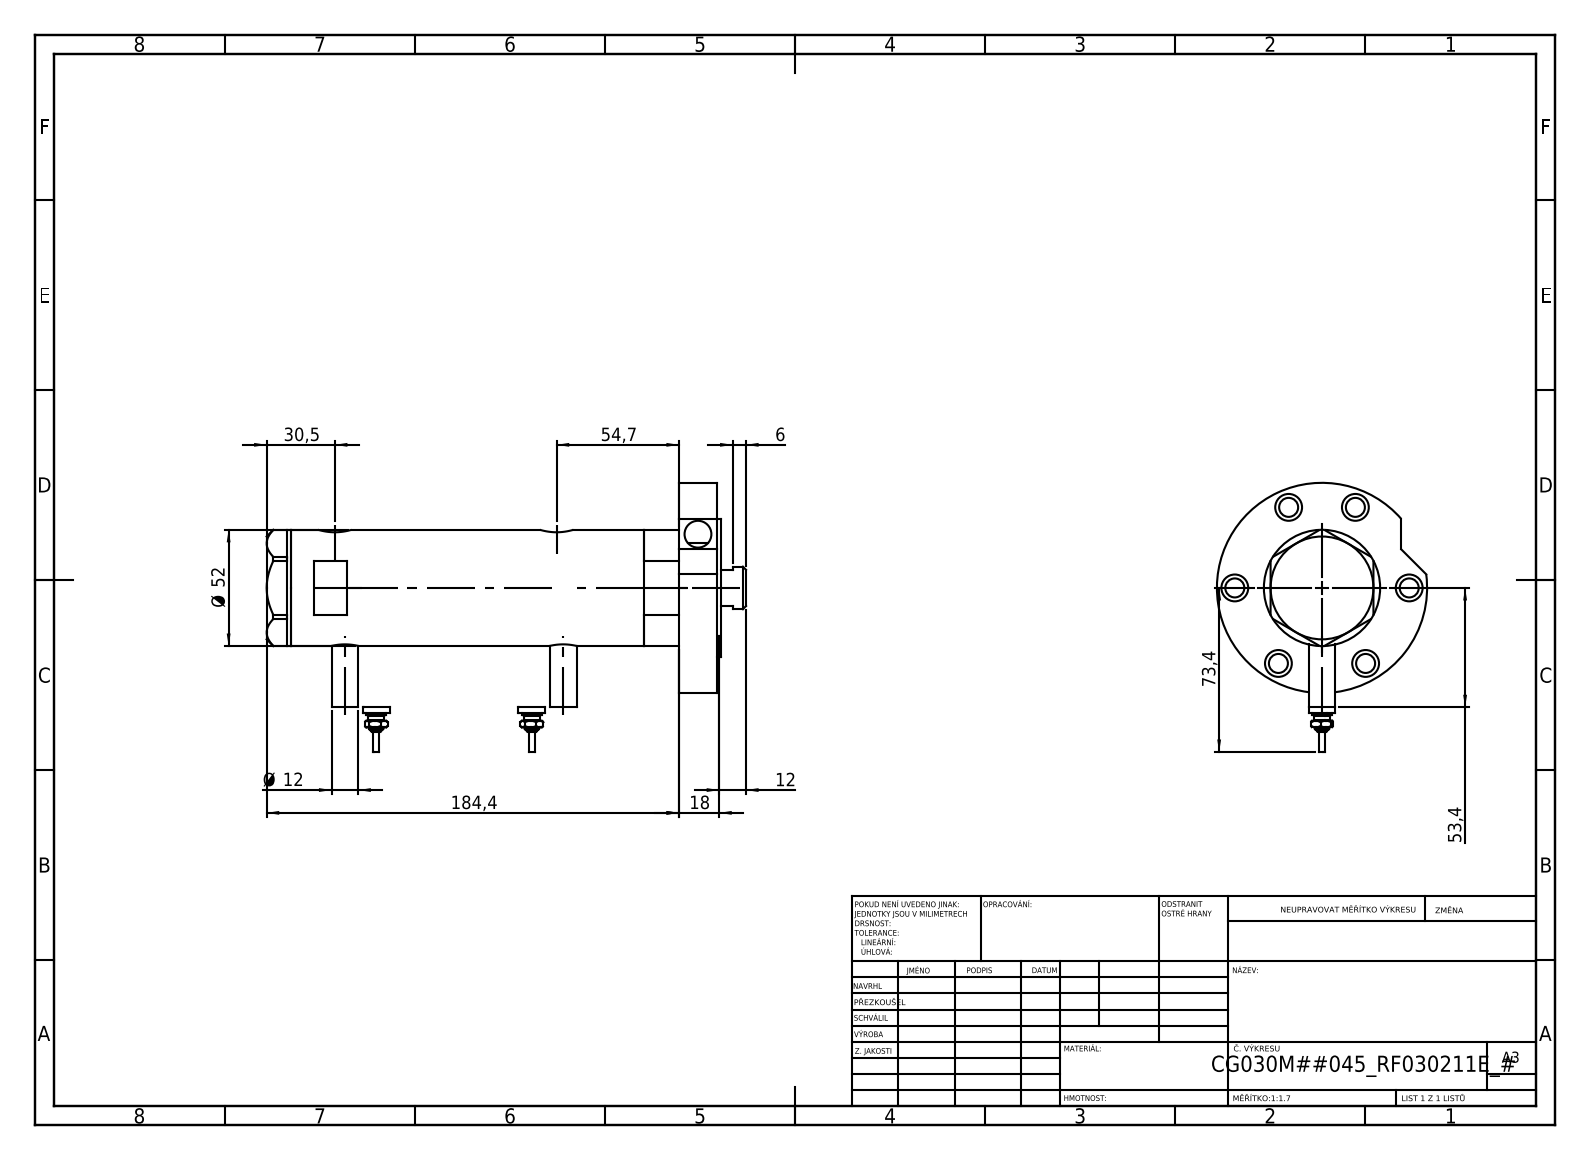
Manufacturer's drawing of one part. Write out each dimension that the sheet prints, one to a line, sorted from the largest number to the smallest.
184,4
73,4
54,7
53,4
Ø 52
30,5
18
12
Ø 12
6
